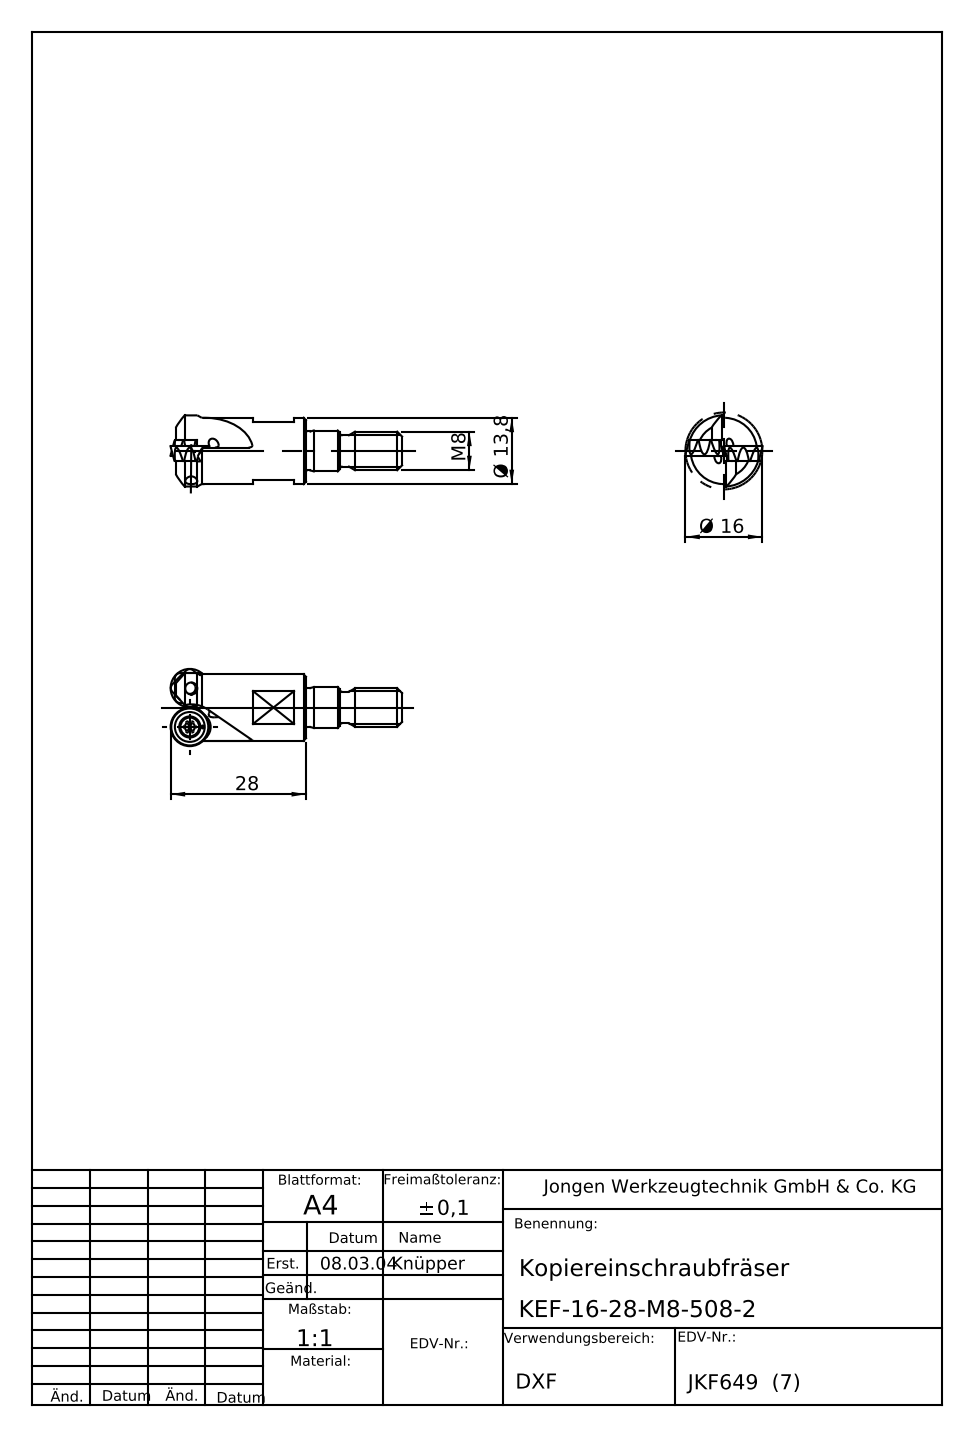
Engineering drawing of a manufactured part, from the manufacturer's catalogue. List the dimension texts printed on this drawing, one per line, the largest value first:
28
Ø 16
Ø 13,8
M 8
